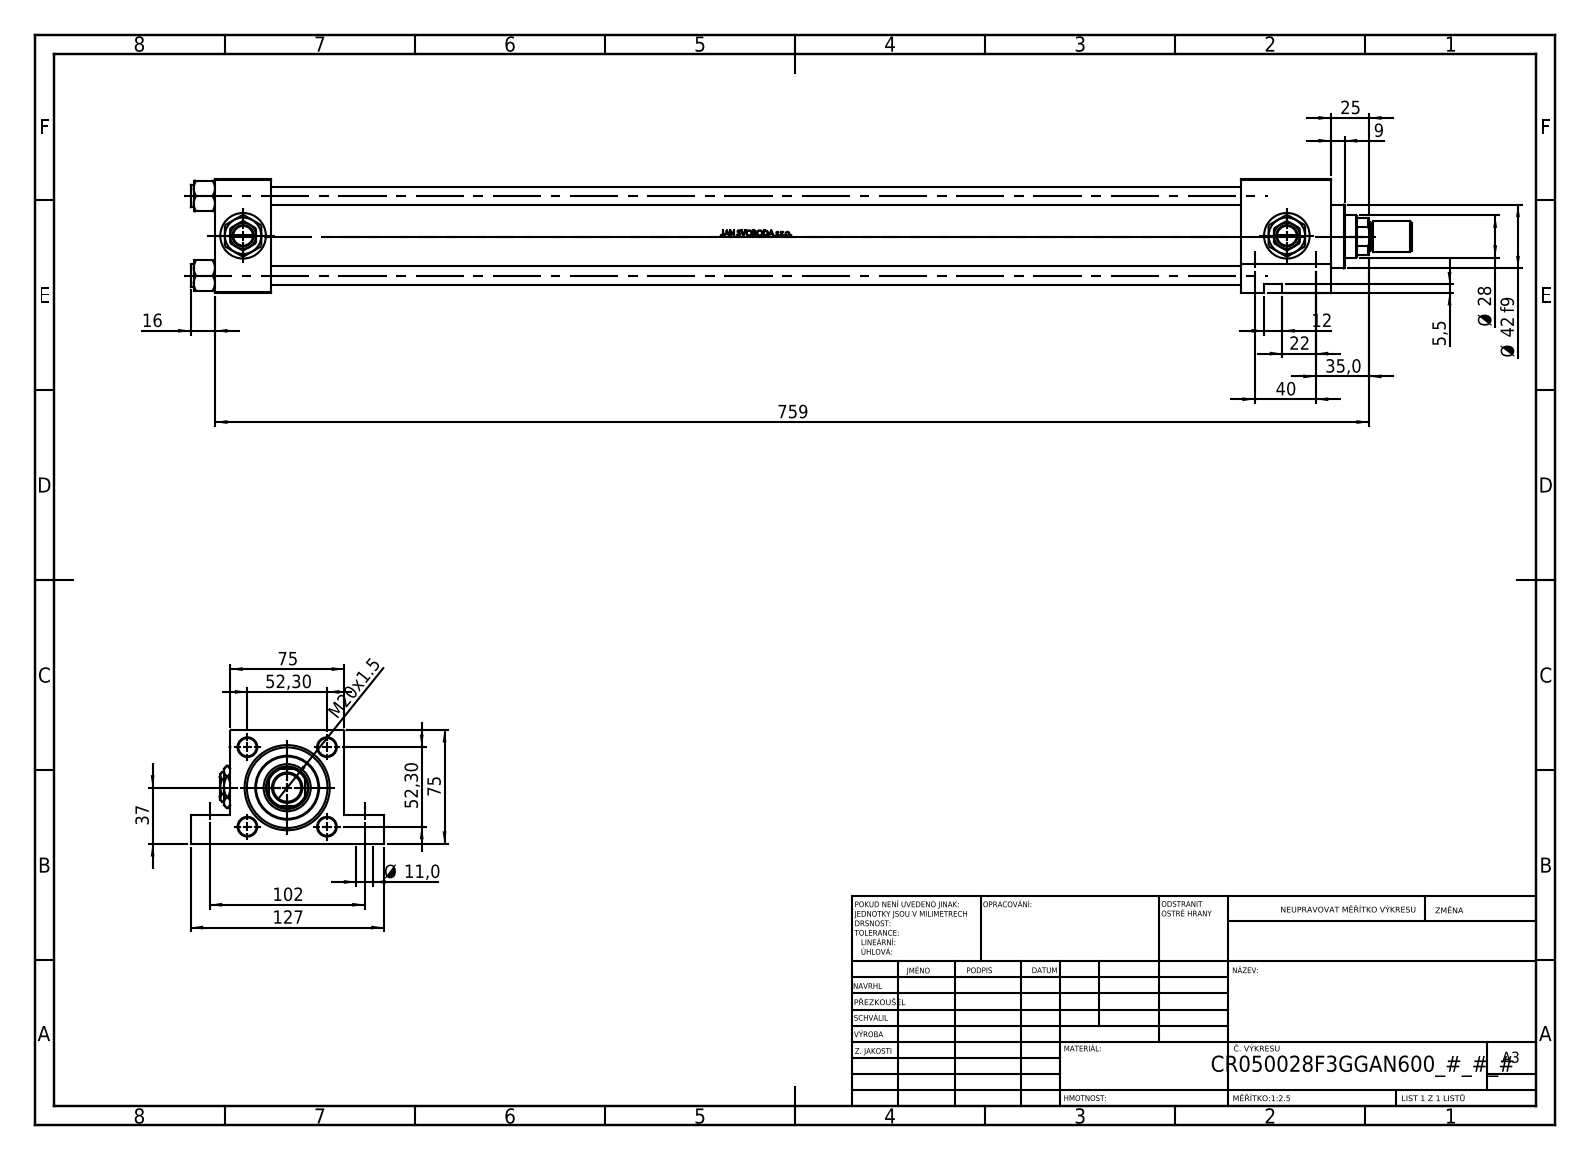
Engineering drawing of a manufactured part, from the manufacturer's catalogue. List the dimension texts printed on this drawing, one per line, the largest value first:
759
127
102
75
75
52,30
52,30
Ø 42 f9
40
37
35,0
Ø 28
25
22
M20x1.5
16
12
Ø 11,0
9
5,5
